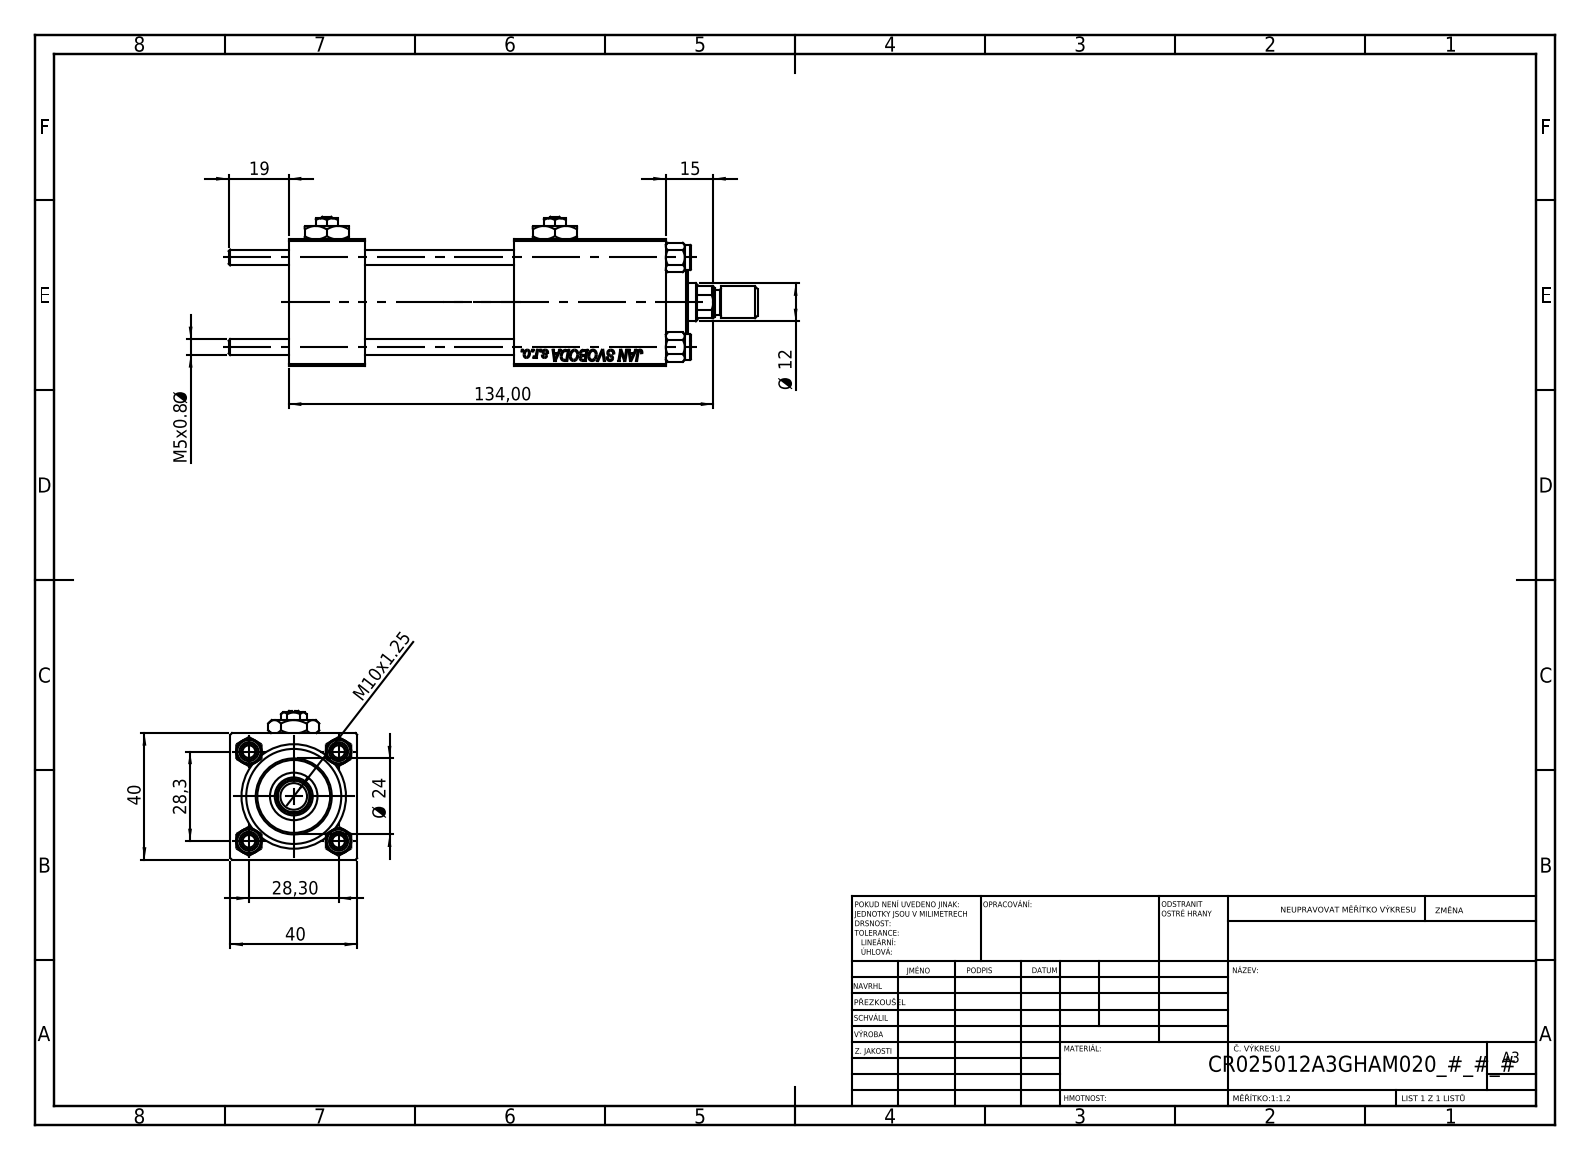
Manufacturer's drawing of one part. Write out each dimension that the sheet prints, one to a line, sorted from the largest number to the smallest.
134,00
40
40
28,3
28,30
Ø 24
19
15
Ø 12
M10x1.25
M5x0.8 Ø
